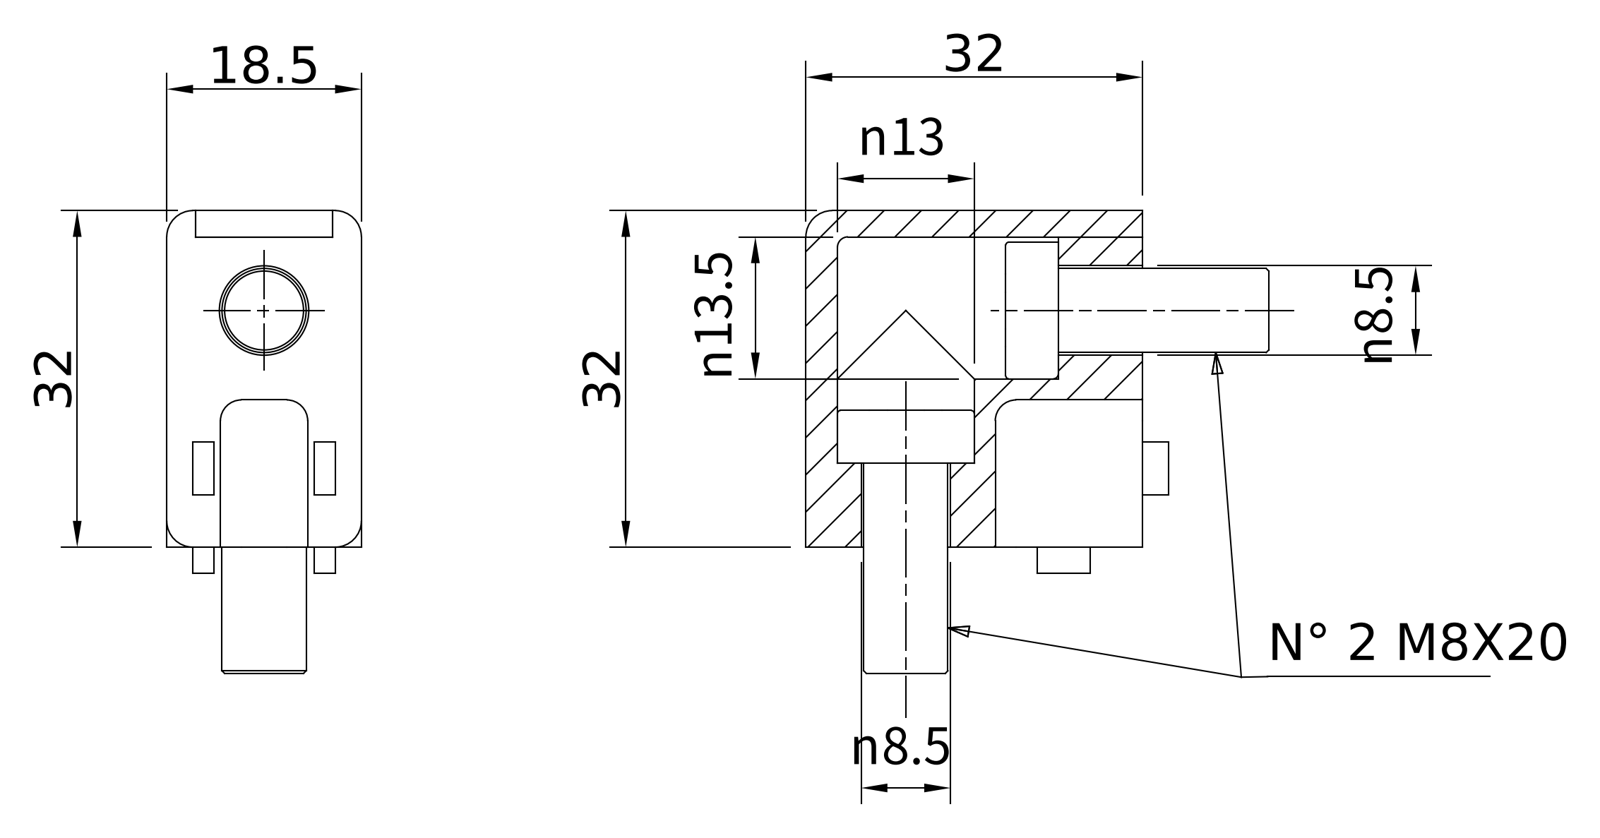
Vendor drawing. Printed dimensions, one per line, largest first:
32
32
32
18.5
n13.5
n13
n8.5
n8.5
